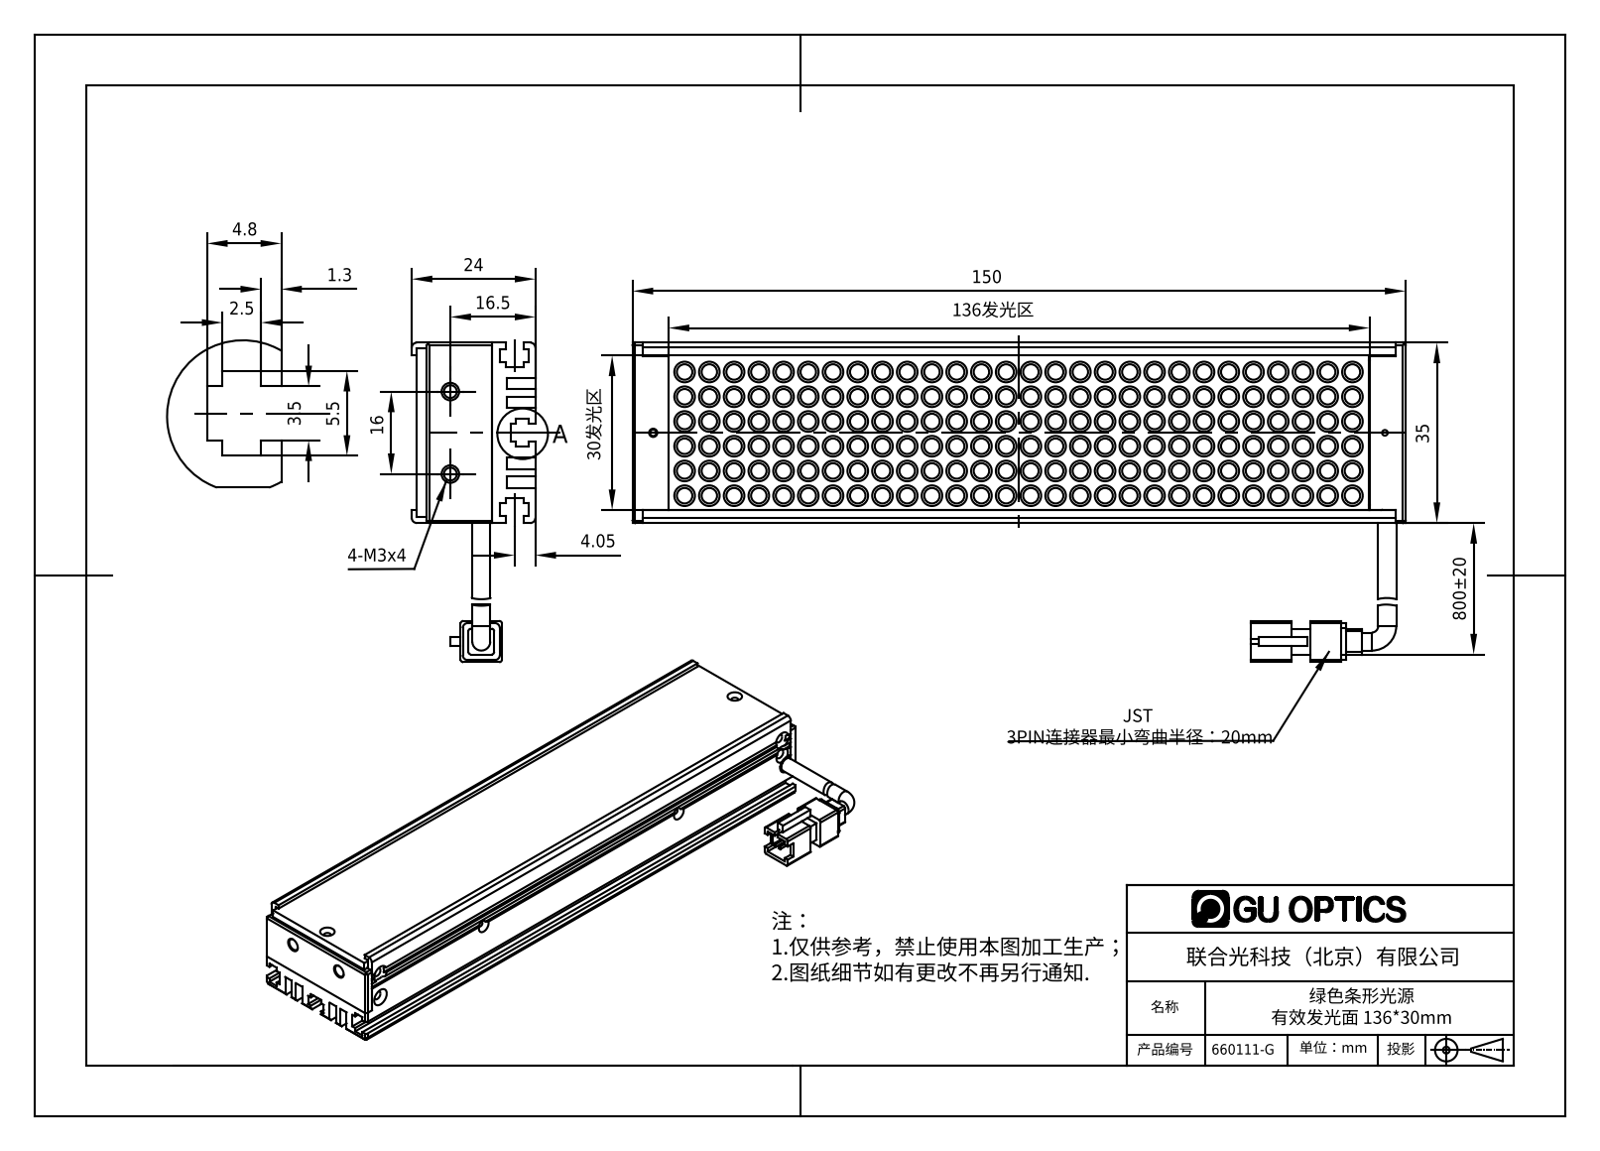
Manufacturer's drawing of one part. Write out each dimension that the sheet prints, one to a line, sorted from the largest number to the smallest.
800±20
150
136发光区
35
30发光区
24
16.5
16
5.5
4.8
4.05
3.5
2.5
1.3
